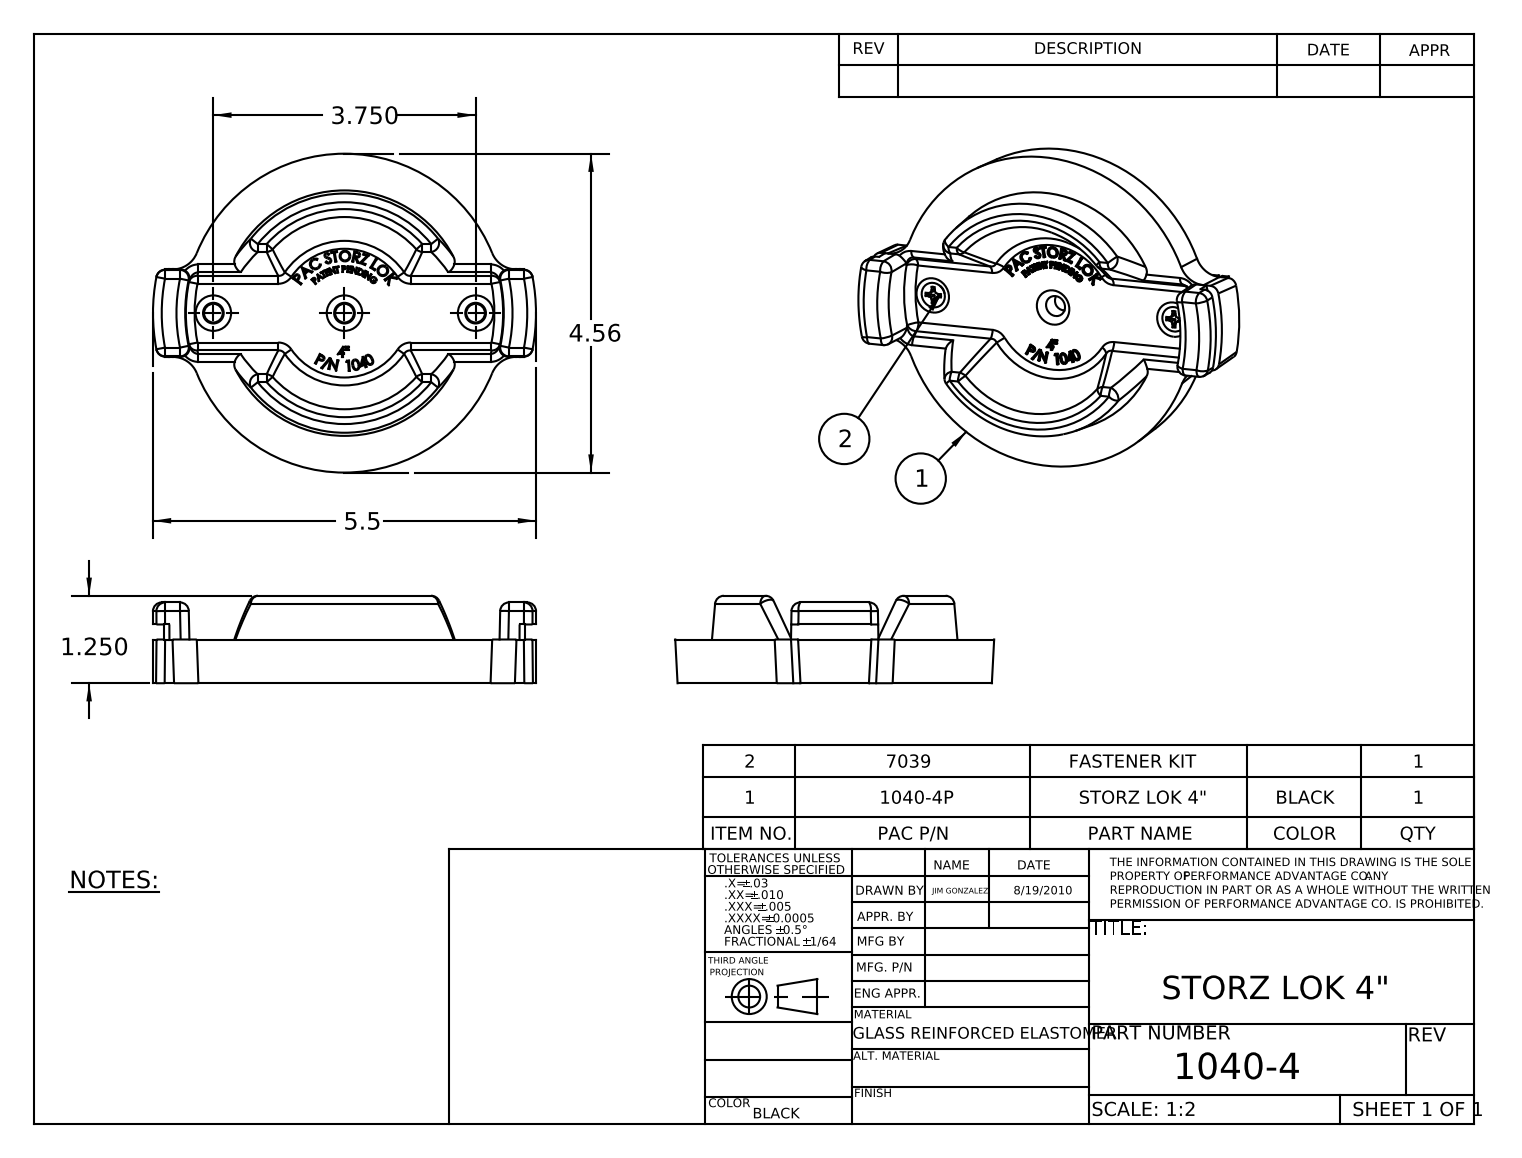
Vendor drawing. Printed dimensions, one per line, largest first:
5.5
4.56
3.750
1.250
